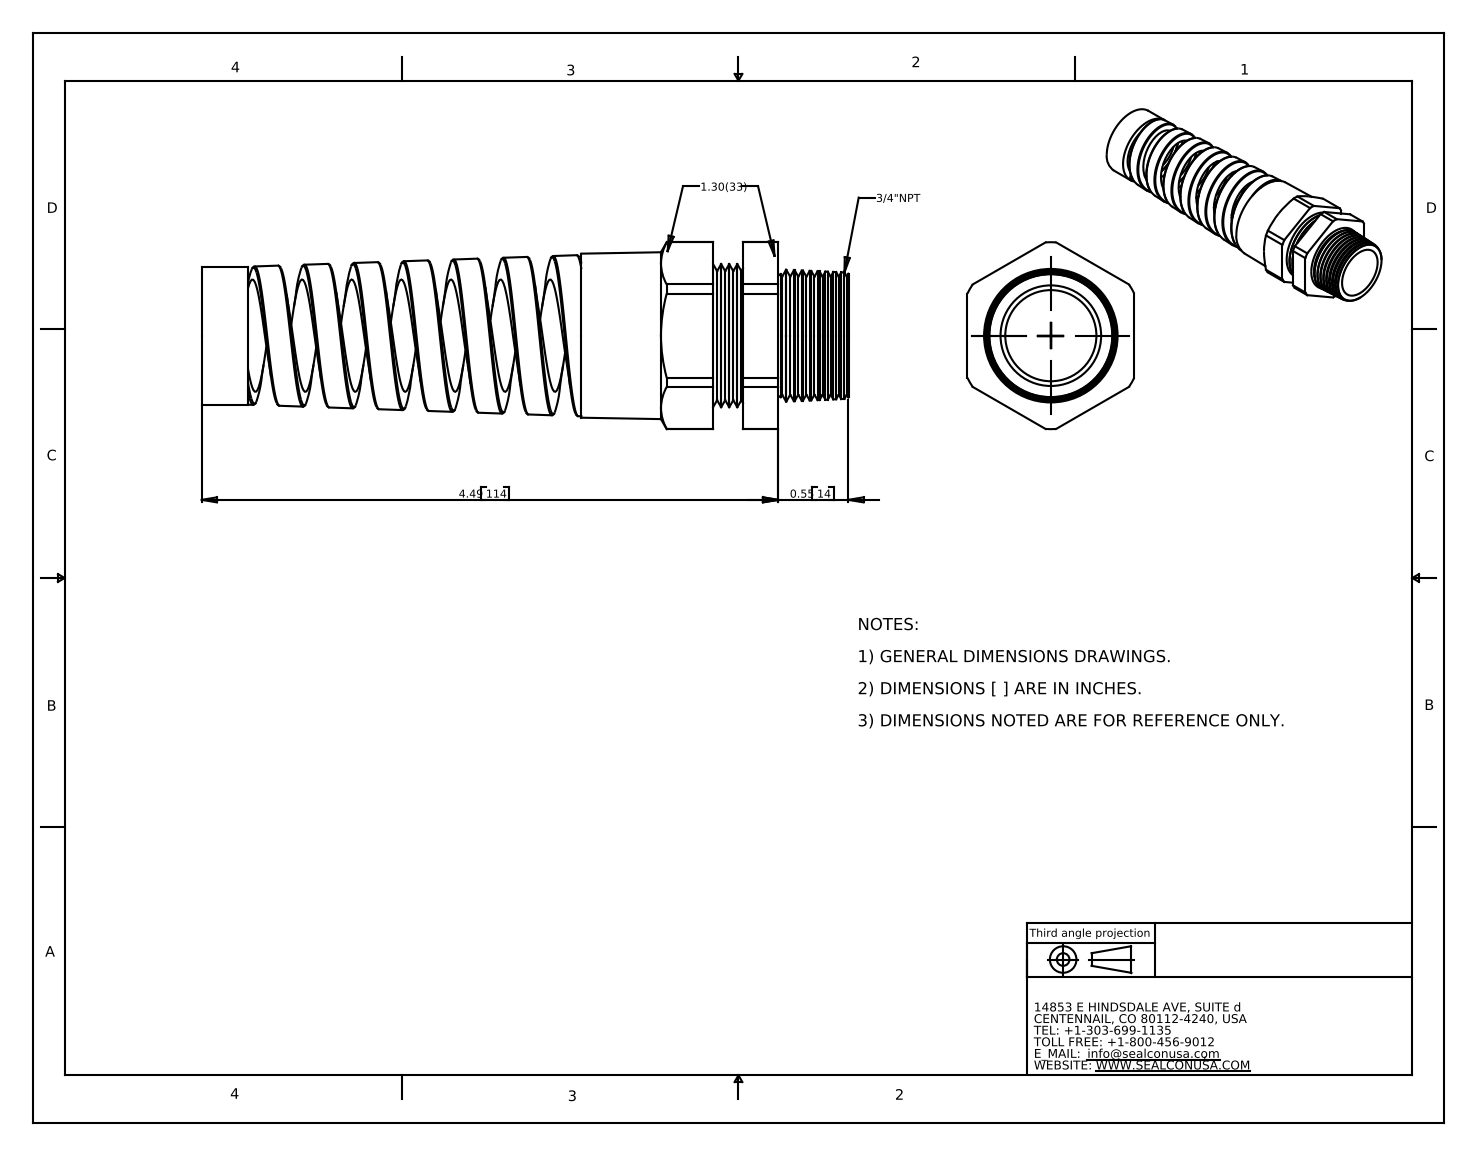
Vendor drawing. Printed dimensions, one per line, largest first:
4.49 114
0.55 14
